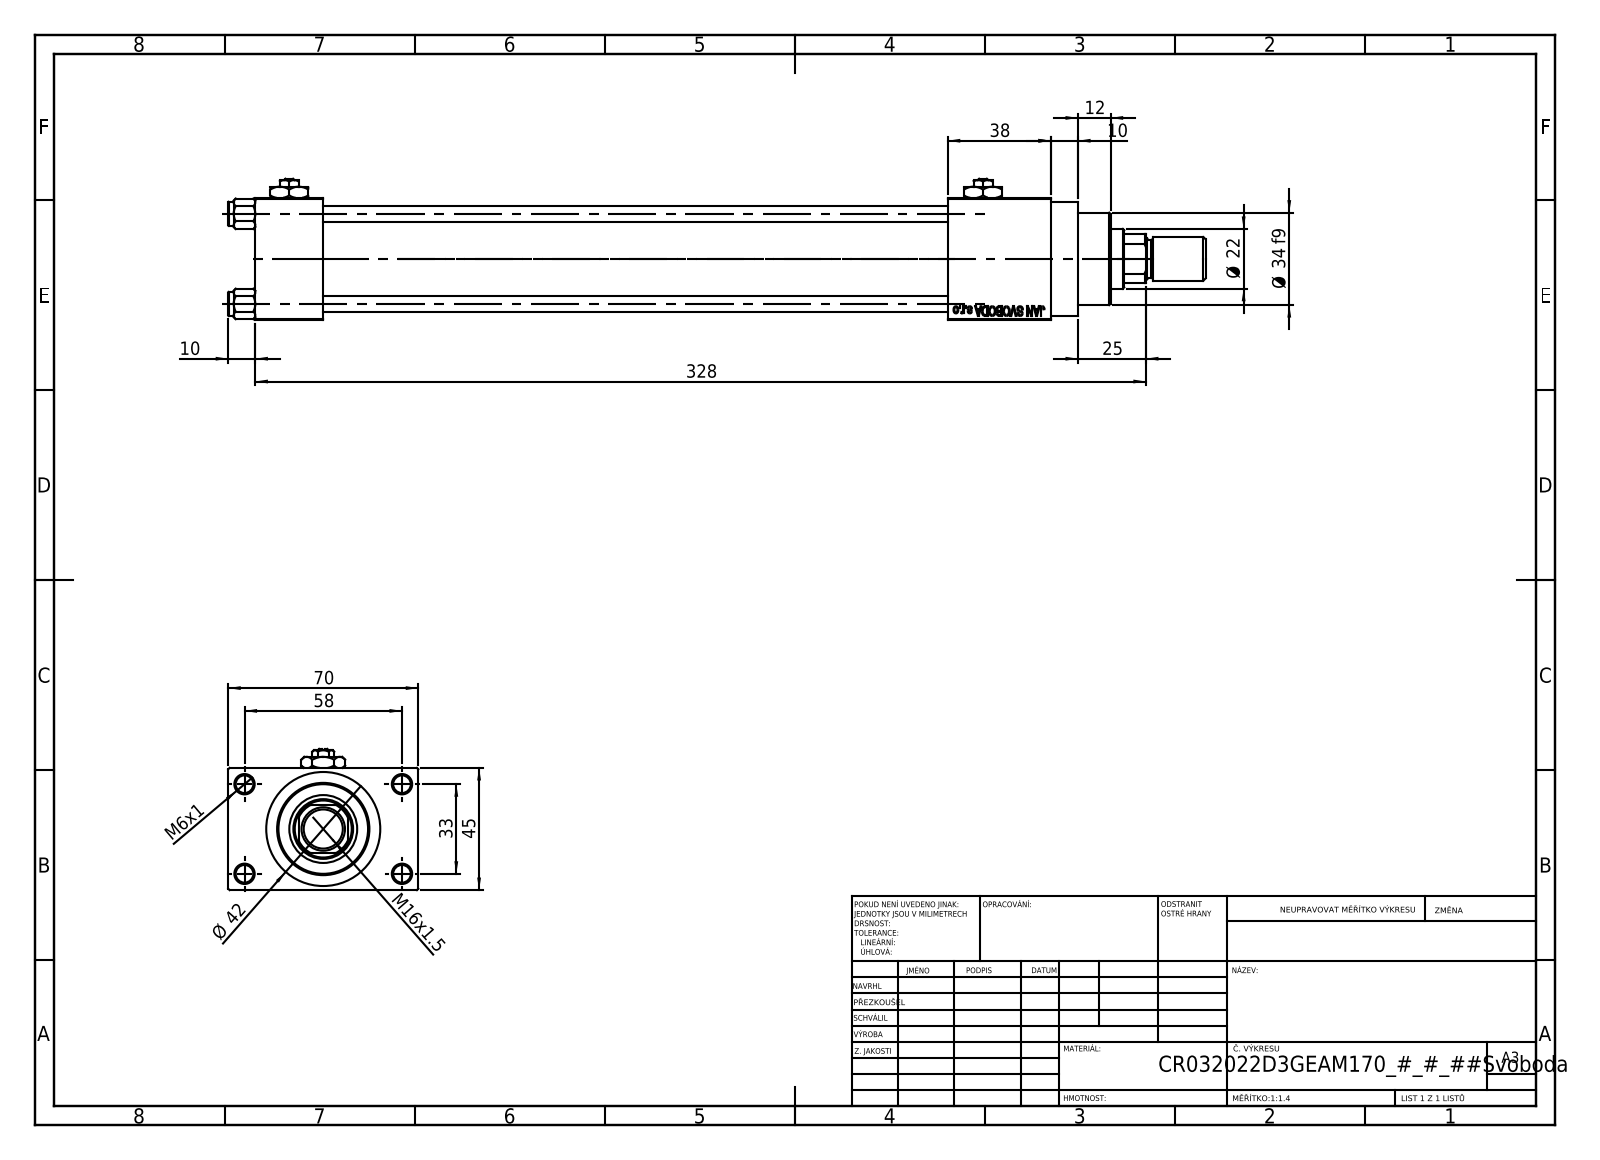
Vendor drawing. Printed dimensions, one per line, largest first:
328
70
58
45
Ø 42
38
Ø 34 f9
33
25
Ø 22
M16x1.5
12
10
10
M6x1
